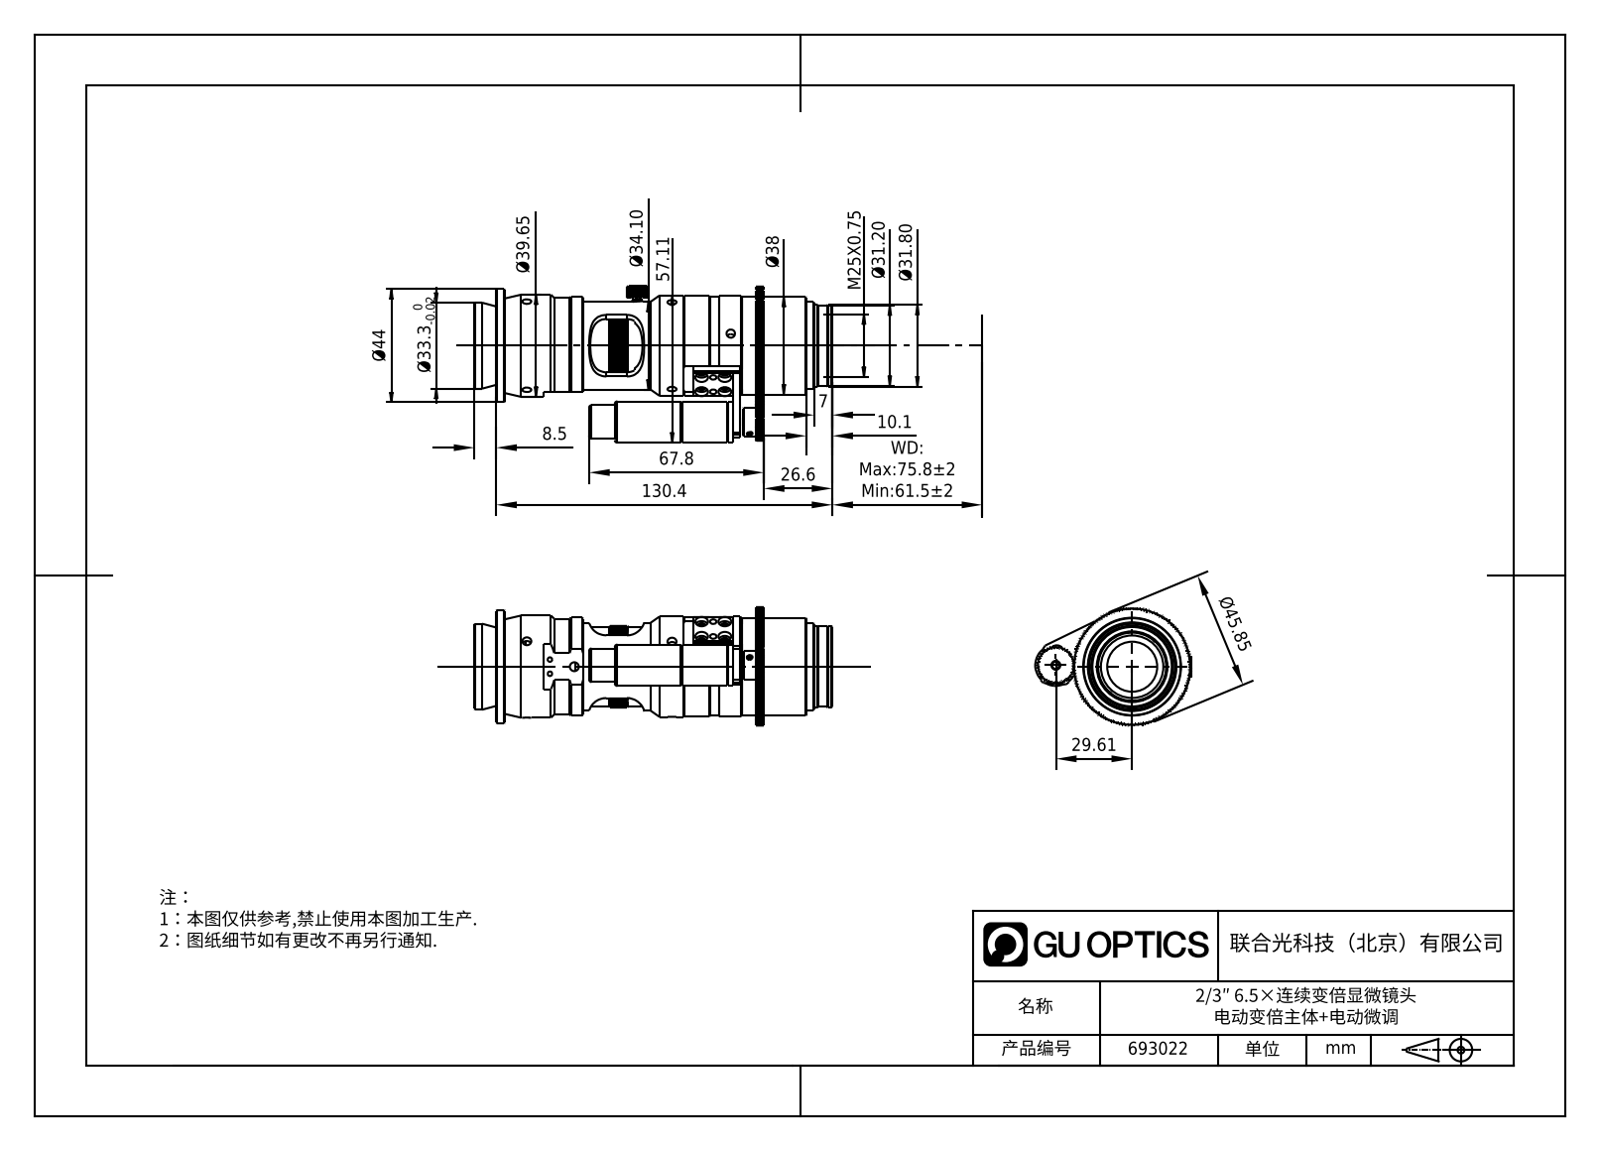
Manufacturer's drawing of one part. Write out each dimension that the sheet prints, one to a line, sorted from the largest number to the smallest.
130.4
WD: Max:75.8±2 Min:61.5±2
67.8
Ø45.85
29.61
26.6
10.1
8.5
7
